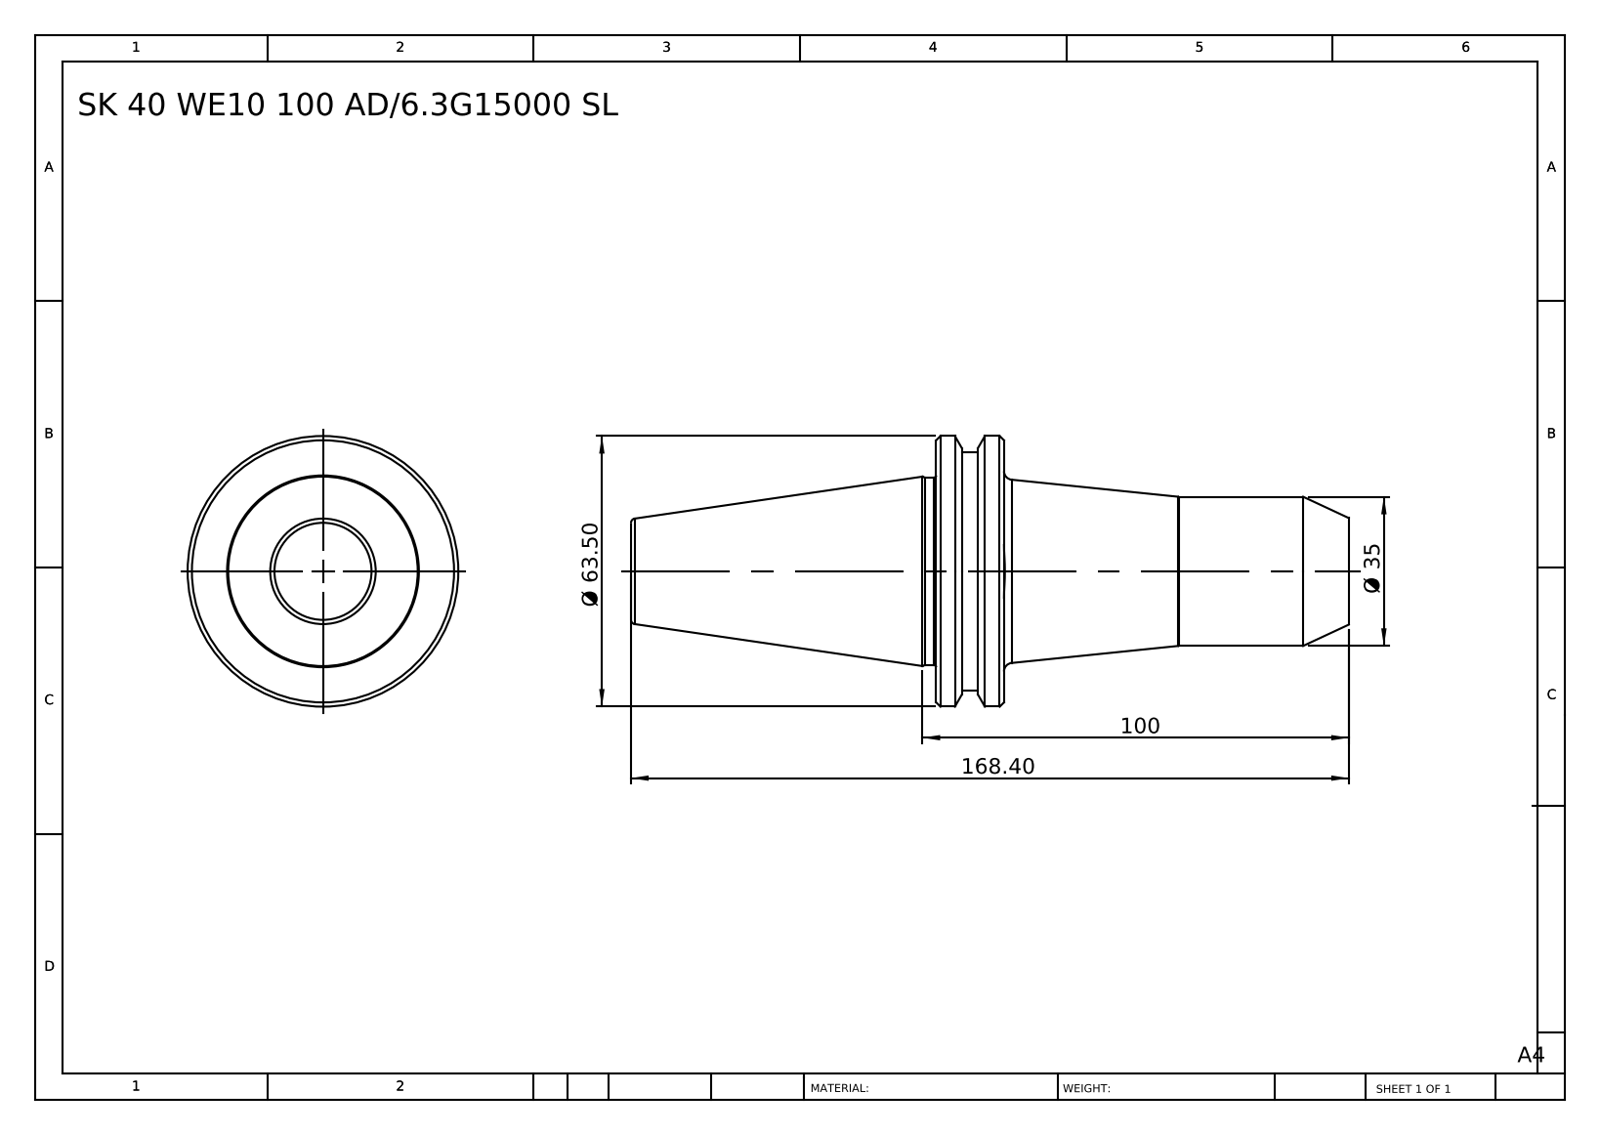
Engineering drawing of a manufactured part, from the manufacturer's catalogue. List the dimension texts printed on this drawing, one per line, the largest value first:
168.40
100
Ø 63.50
Ø 35
